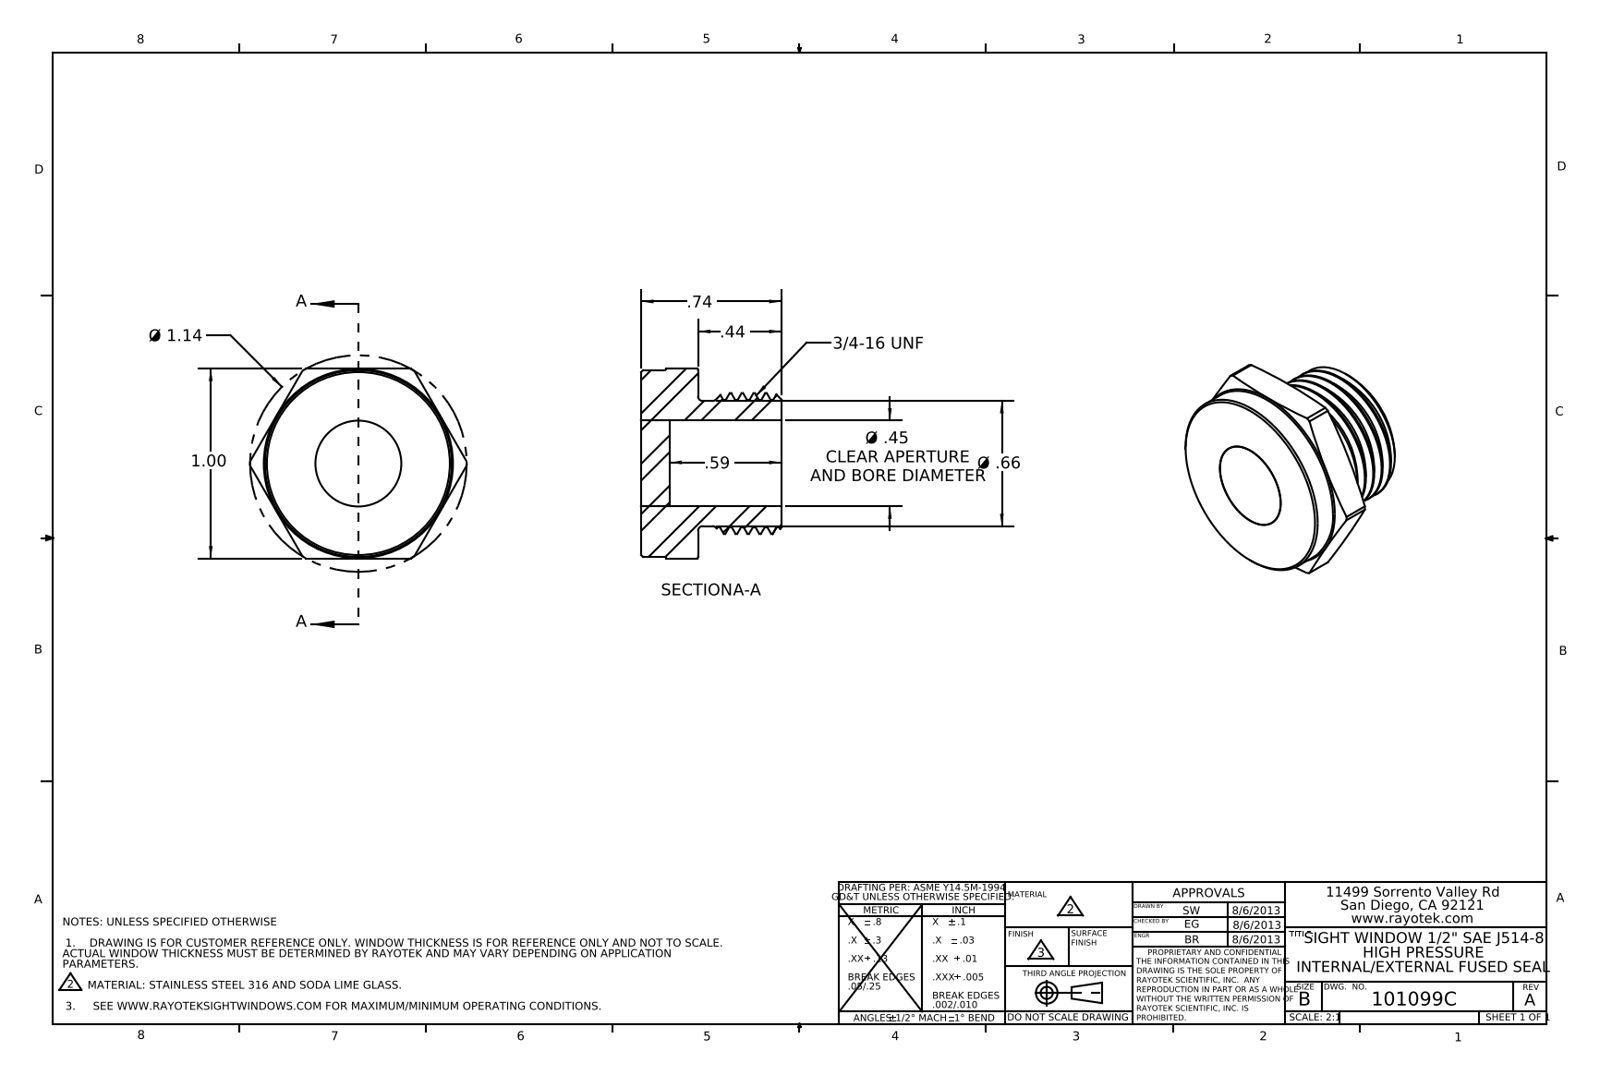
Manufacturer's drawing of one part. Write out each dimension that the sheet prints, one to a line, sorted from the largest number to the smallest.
Ø 1.14
1.00
.74
Ø .66
.59
Ø .45 CLEAR APERTURE AND BORE DIAMETER
.44
